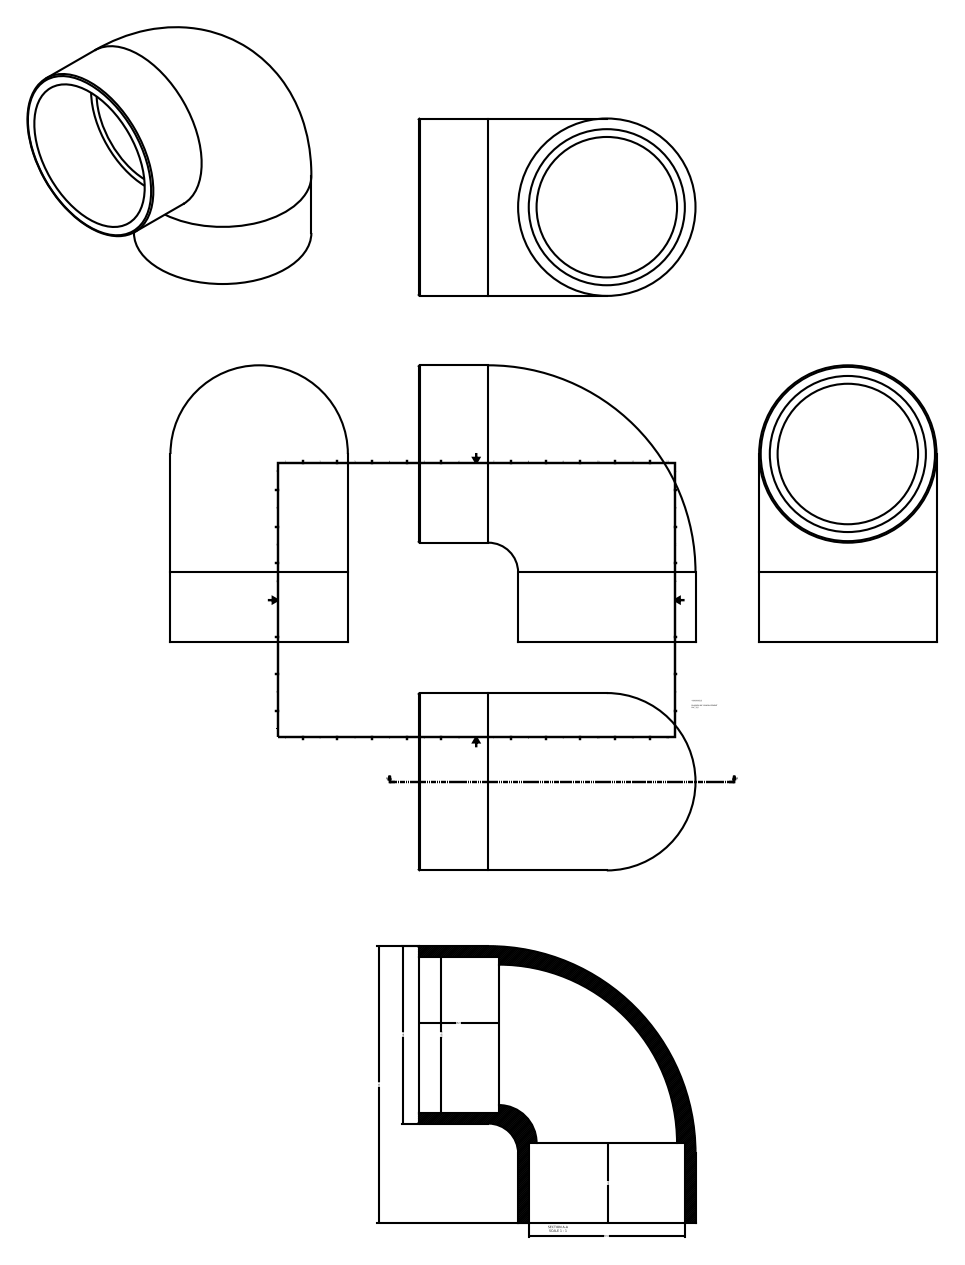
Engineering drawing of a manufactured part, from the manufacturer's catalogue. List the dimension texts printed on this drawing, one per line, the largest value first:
559.00
358.00
315.00
315.00
162.00
162.00
